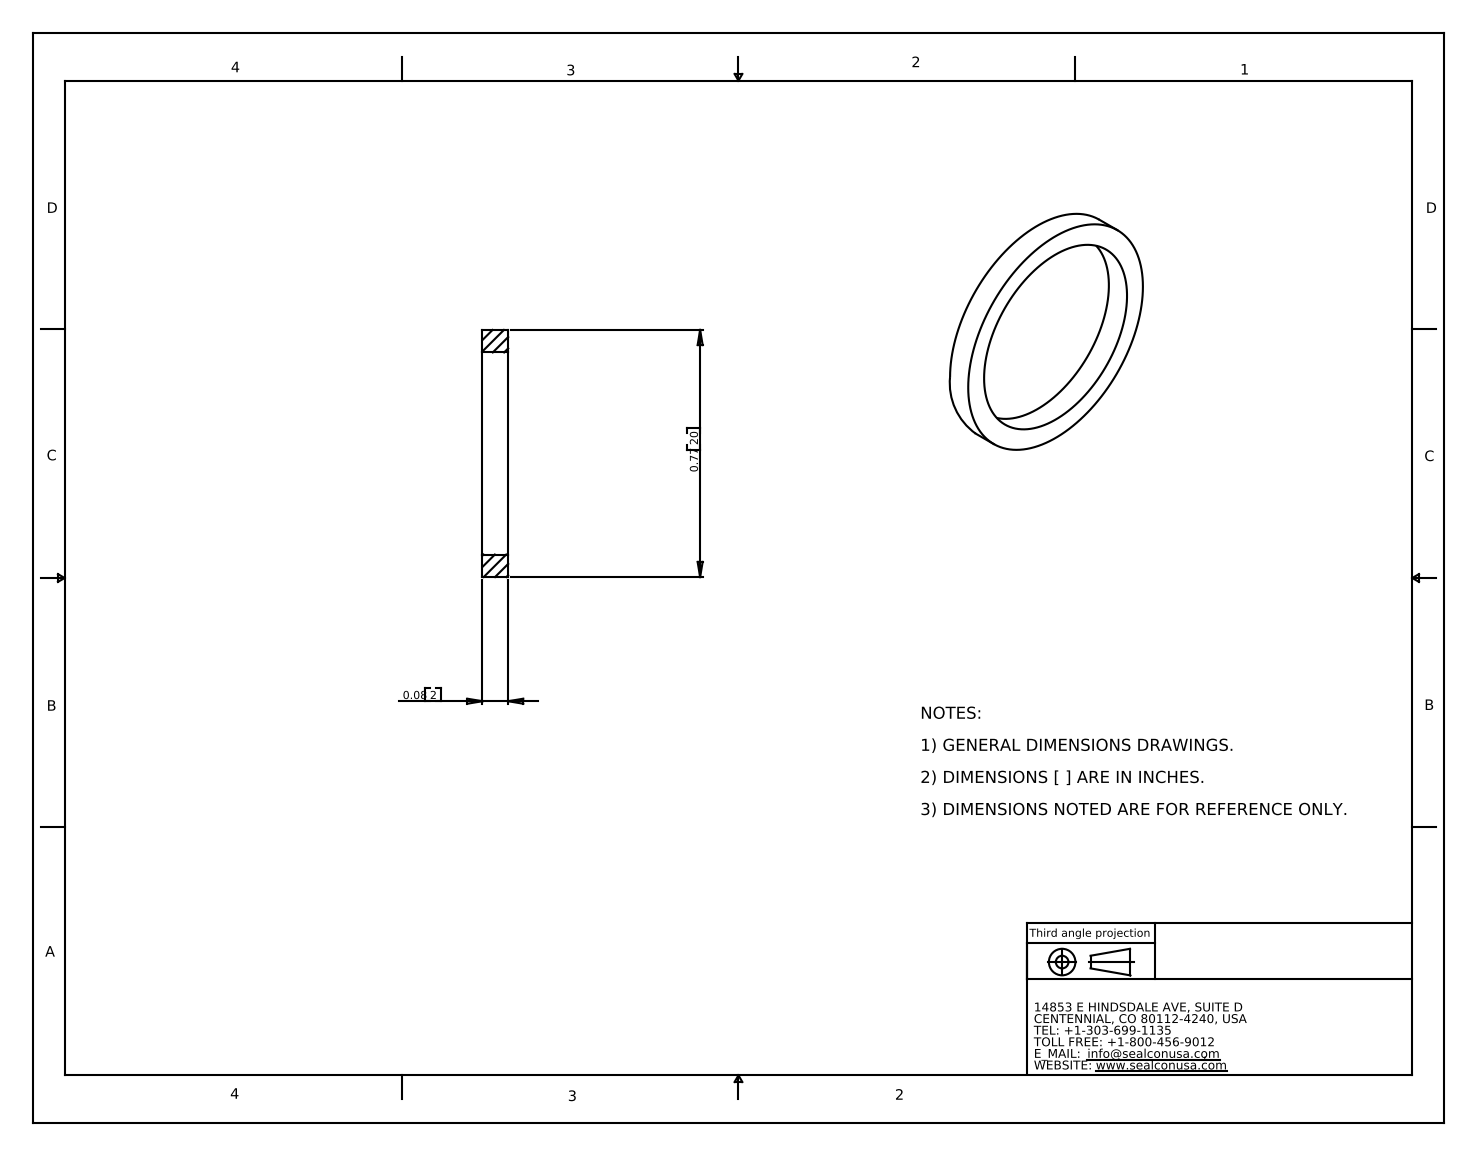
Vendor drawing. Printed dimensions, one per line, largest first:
0.77 20
0.08 2
